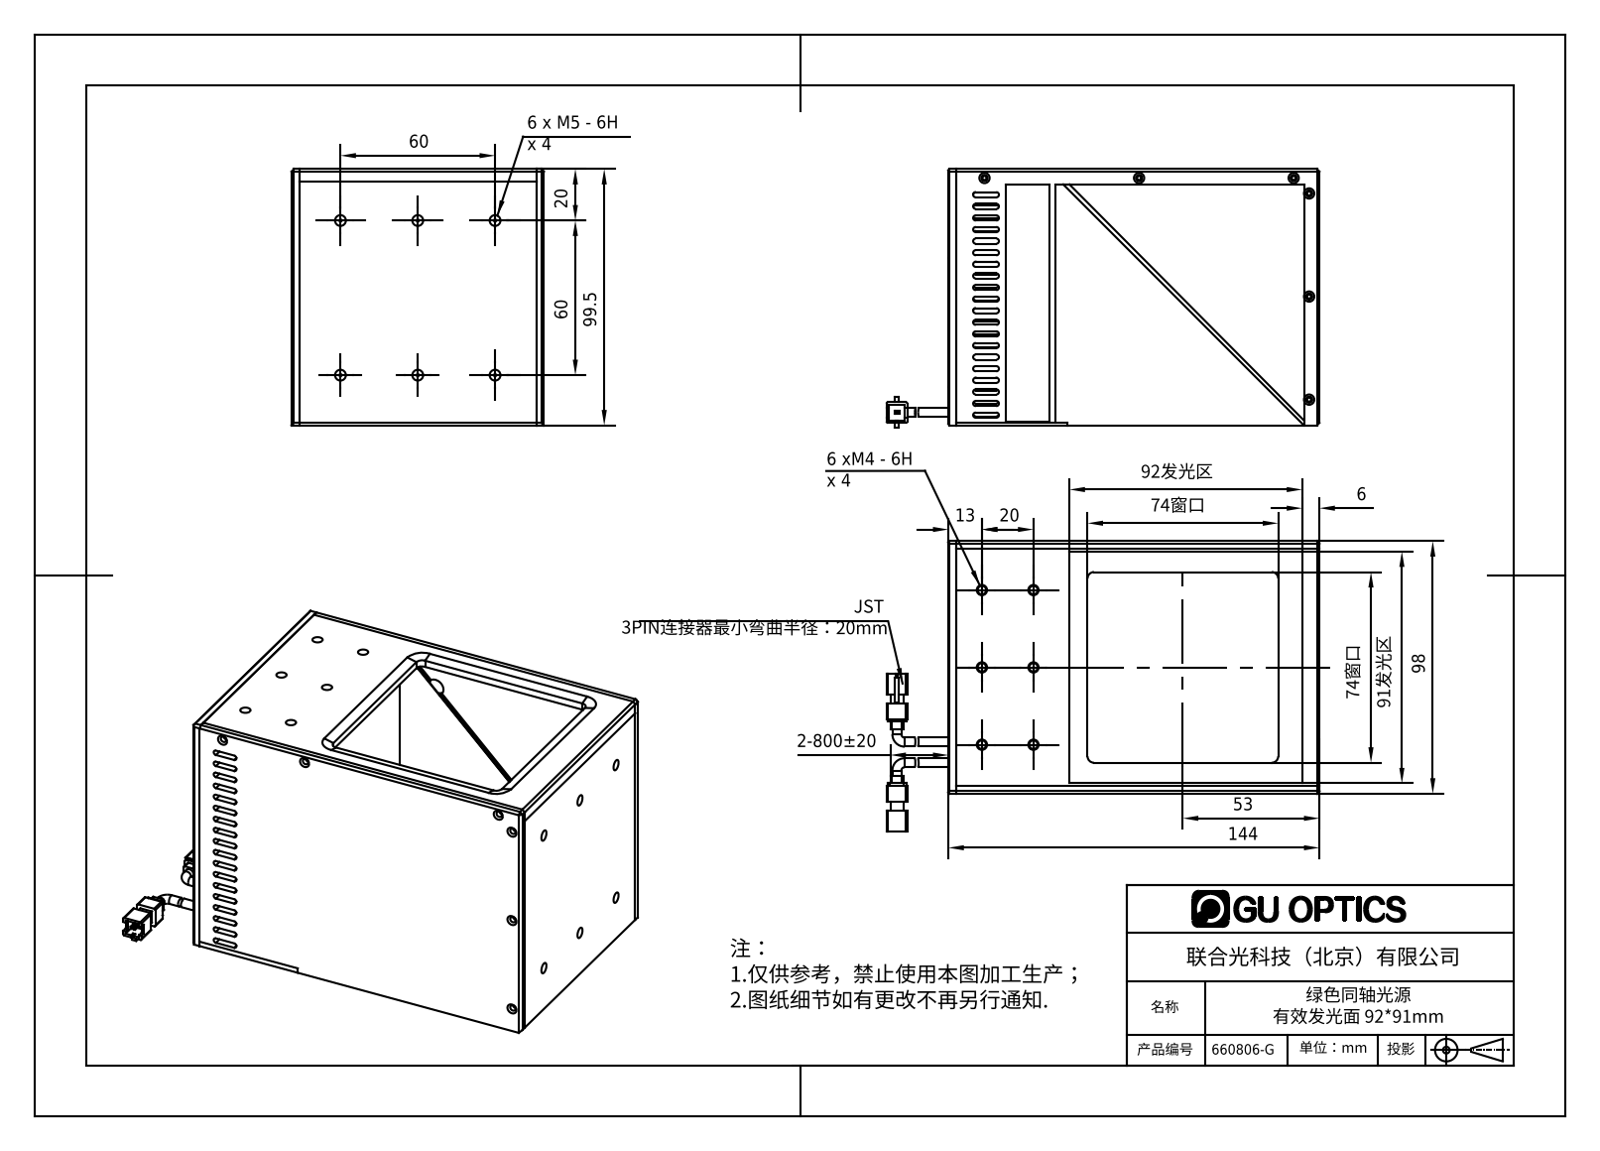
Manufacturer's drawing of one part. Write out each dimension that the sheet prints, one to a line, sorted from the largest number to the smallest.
144
99.5
98
92发光区
91发光区
74窗口
74窗口
60
60
53
20
20
13
6
2-800±20
